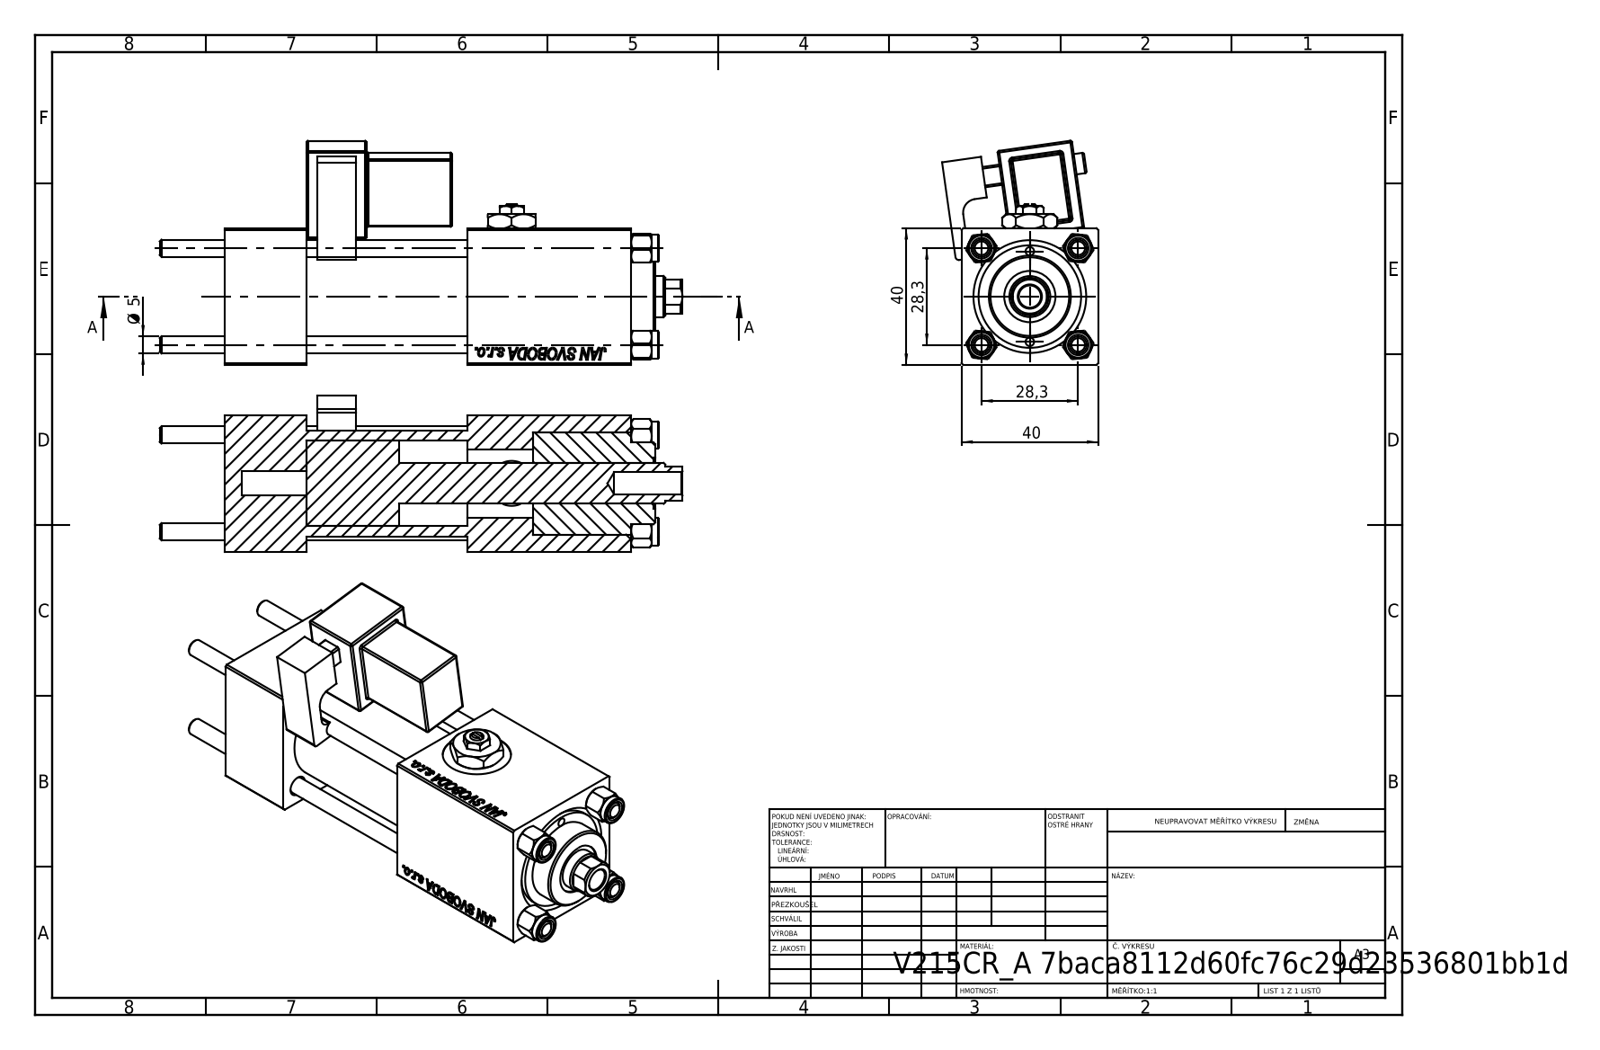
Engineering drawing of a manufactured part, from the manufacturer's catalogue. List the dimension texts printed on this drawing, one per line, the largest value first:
40
40
28,3
28,3
Ø 5
